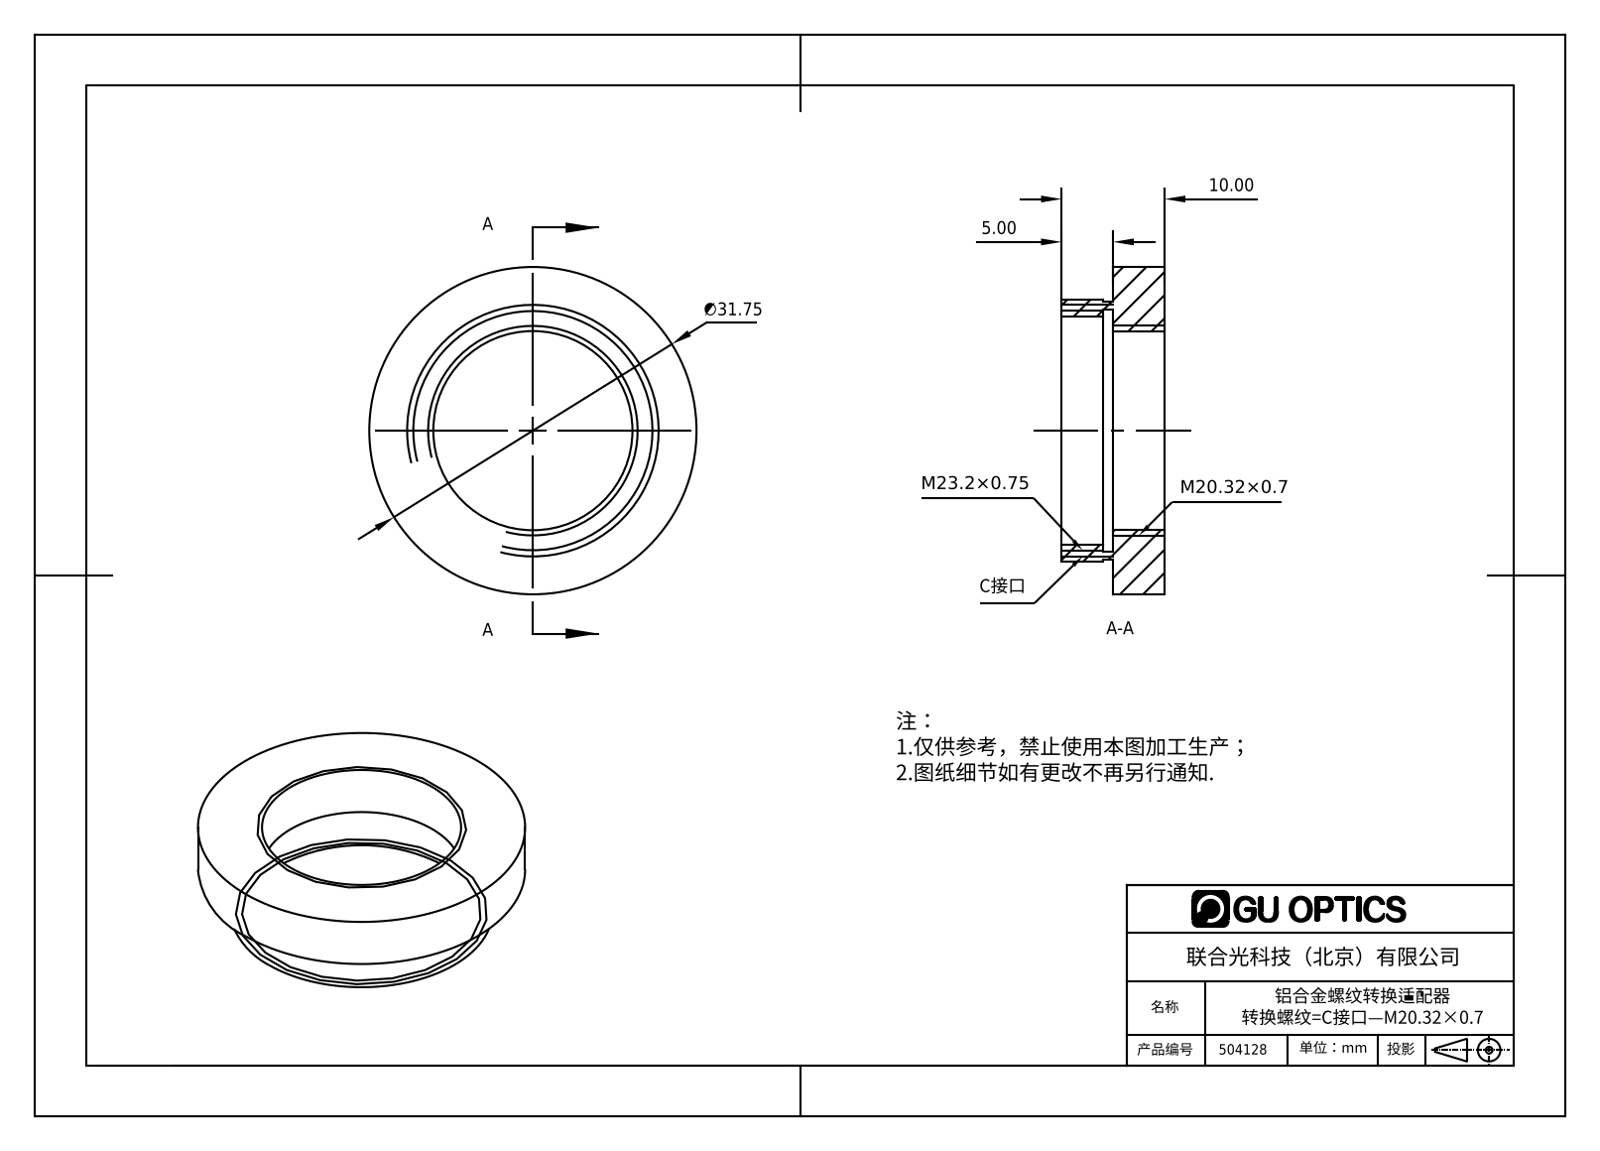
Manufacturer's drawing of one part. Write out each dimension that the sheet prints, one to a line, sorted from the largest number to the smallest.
∅31.75
10.00
5.00
